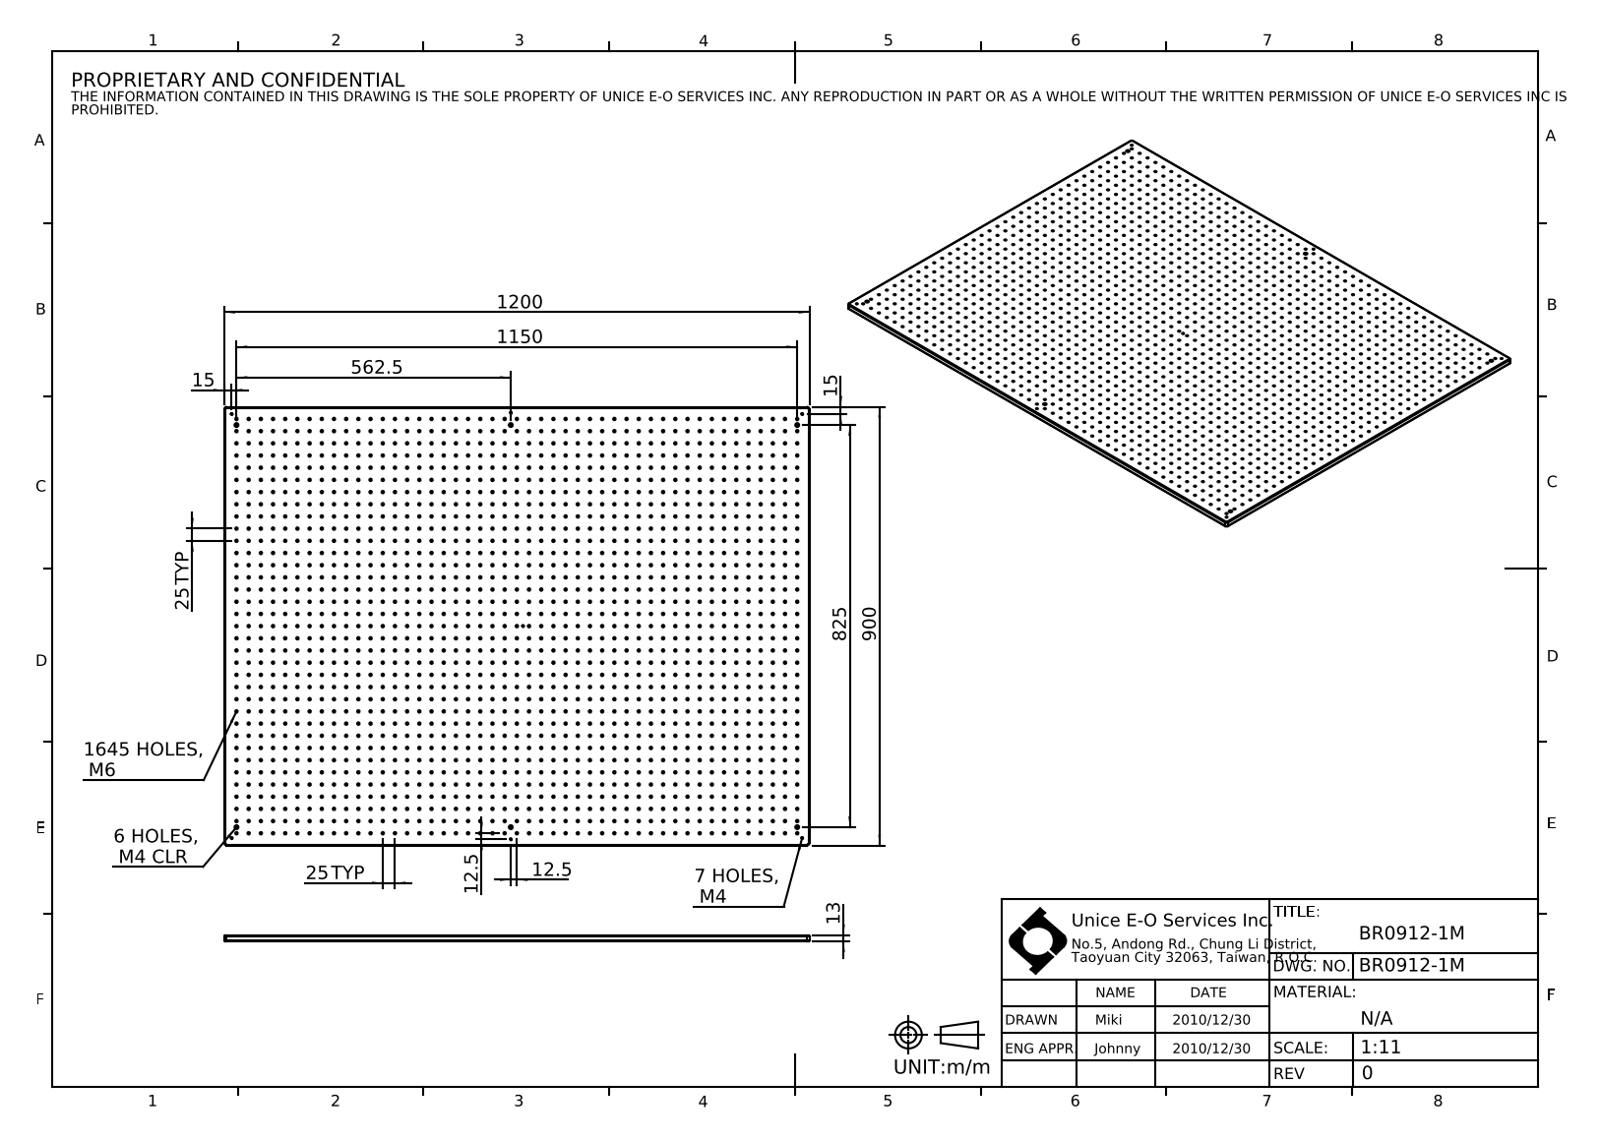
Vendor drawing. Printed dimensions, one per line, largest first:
1645 HOLES, M6
1200
1150
900
825
562.5
25 TYP
25 TYP
15
15
13
12.5
12.5
7 HOLES, M4
6 HOLES, M4 CLR
